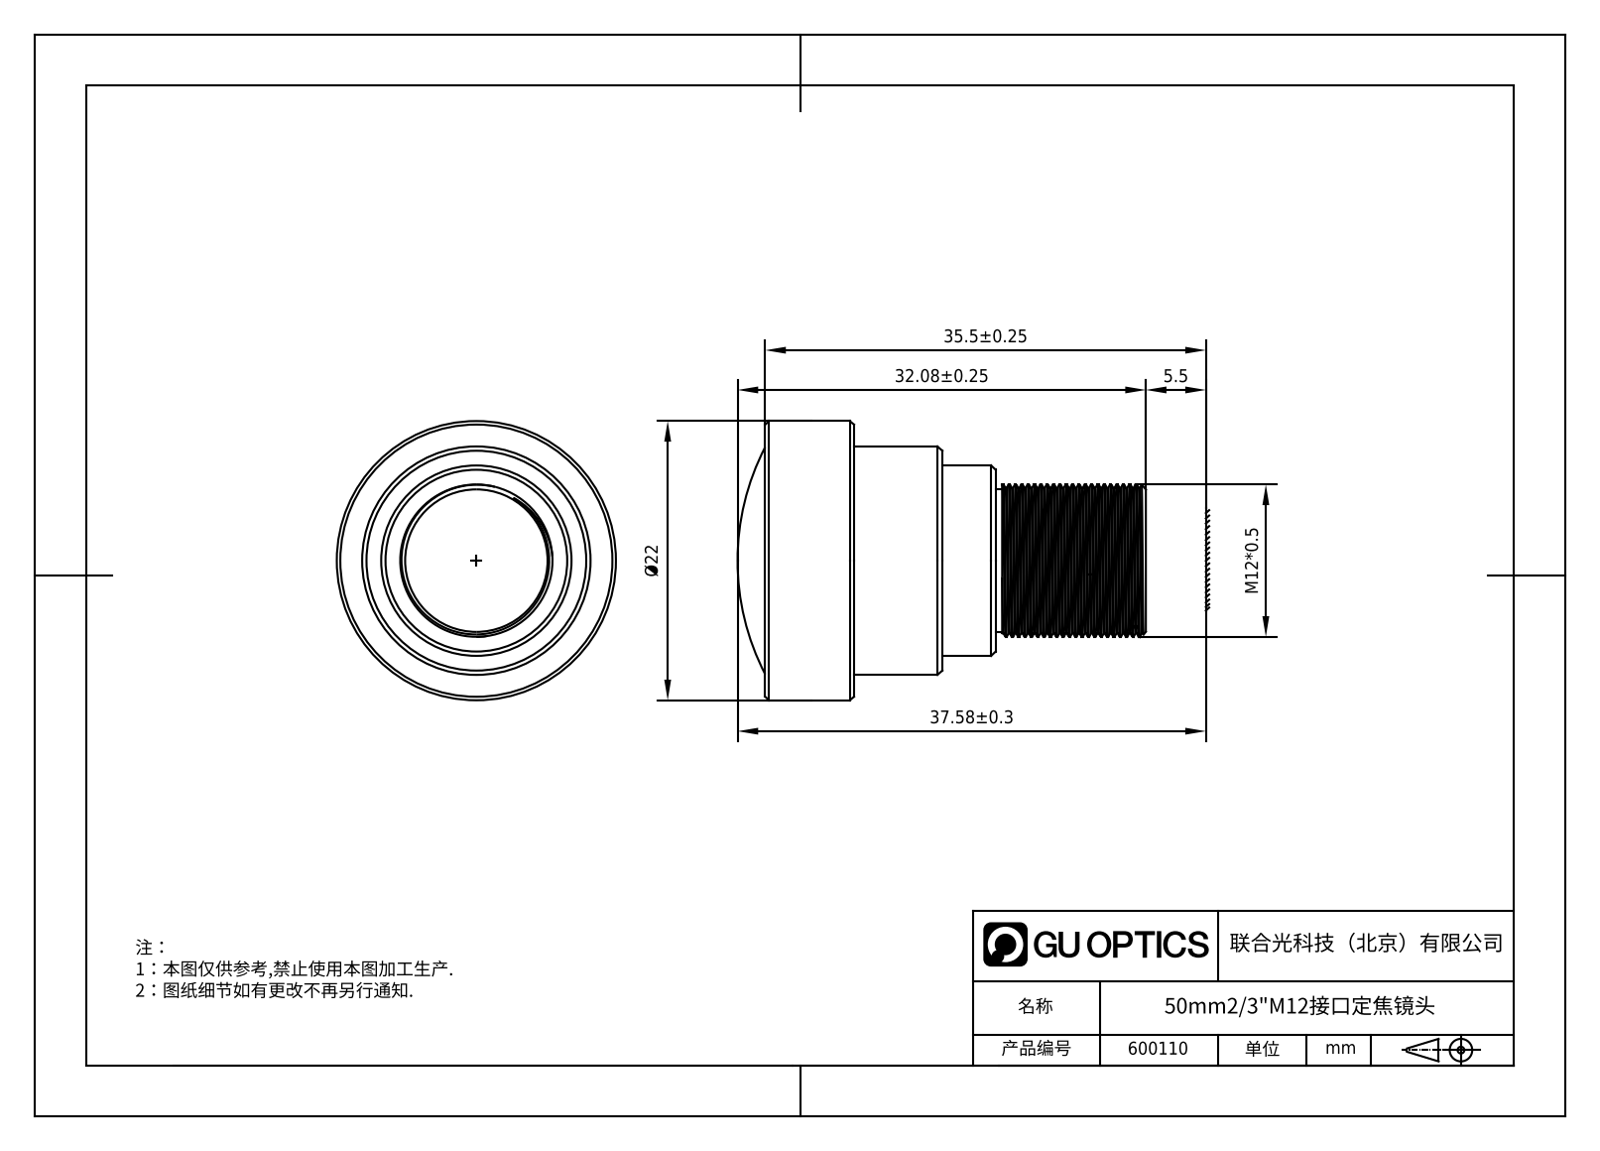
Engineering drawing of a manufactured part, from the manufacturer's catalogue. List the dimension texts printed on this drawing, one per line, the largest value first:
37.58±0.3
35.5±0.25
32.08±0.25
Ø22
M12*0.5
5.5
